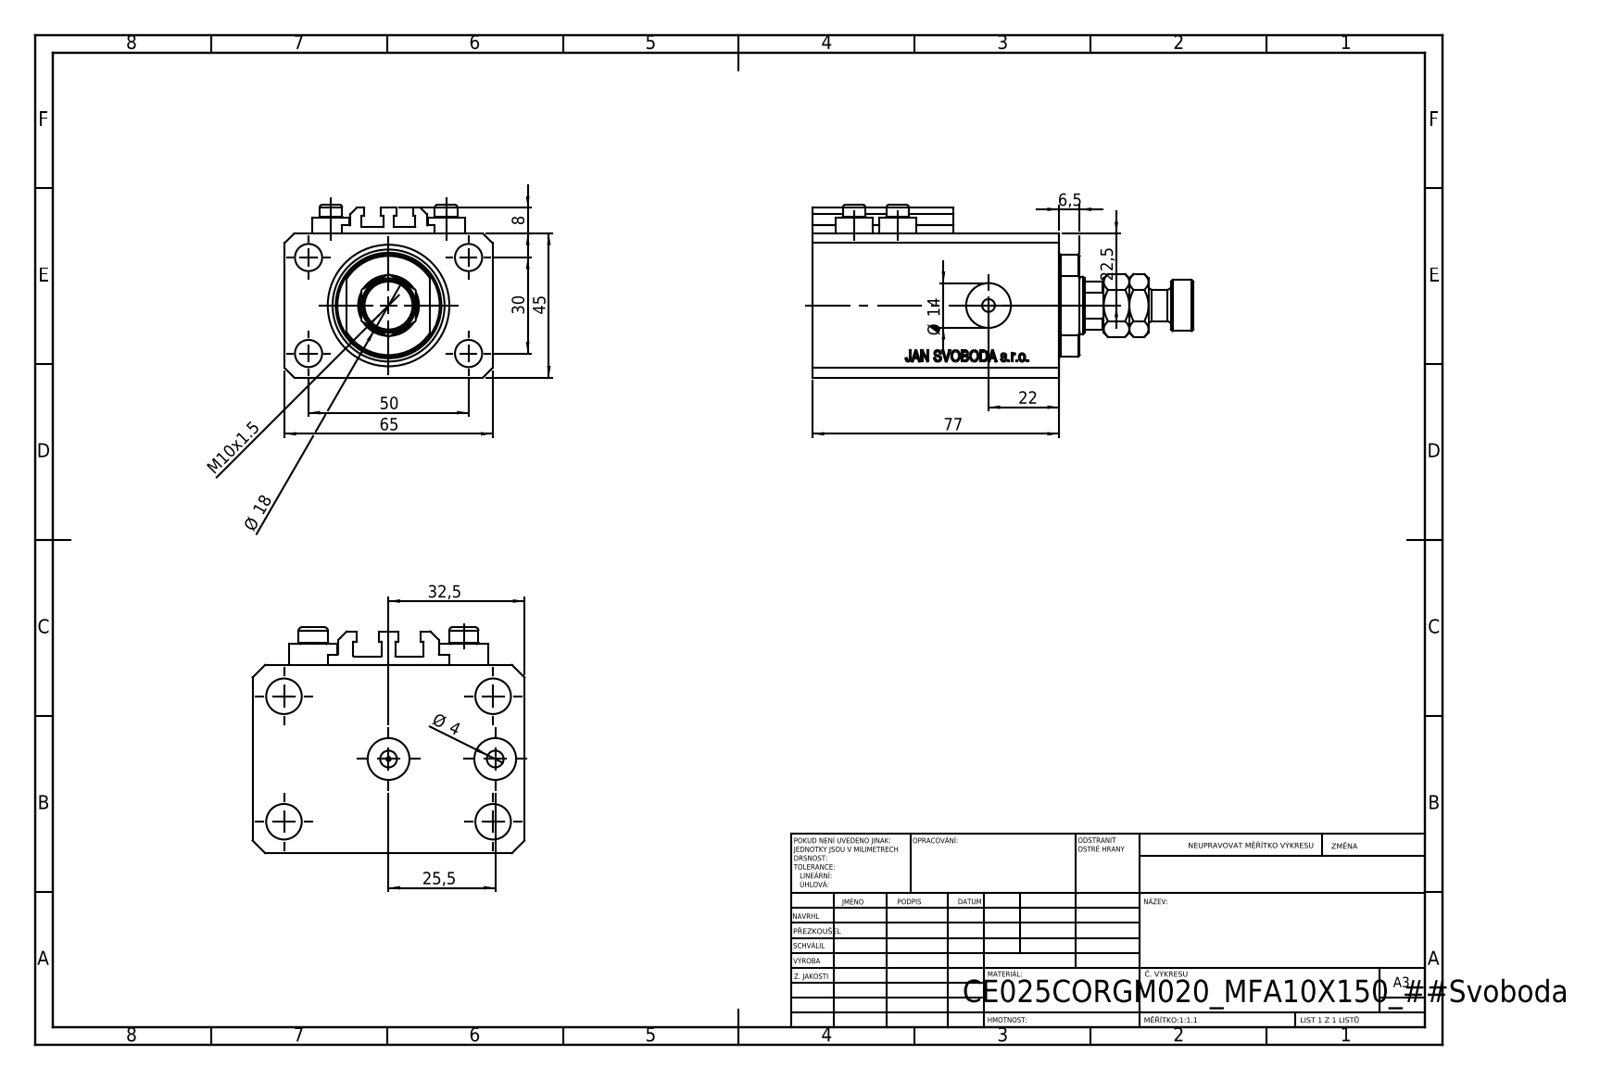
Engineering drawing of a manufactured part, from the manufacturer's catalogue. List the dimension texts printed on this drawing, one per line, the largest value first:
77
65
50
45
32,5
30
25,5
22,5
22
Ø 18
Ø 14
M10x1.5
8
6,5
Ø 4
